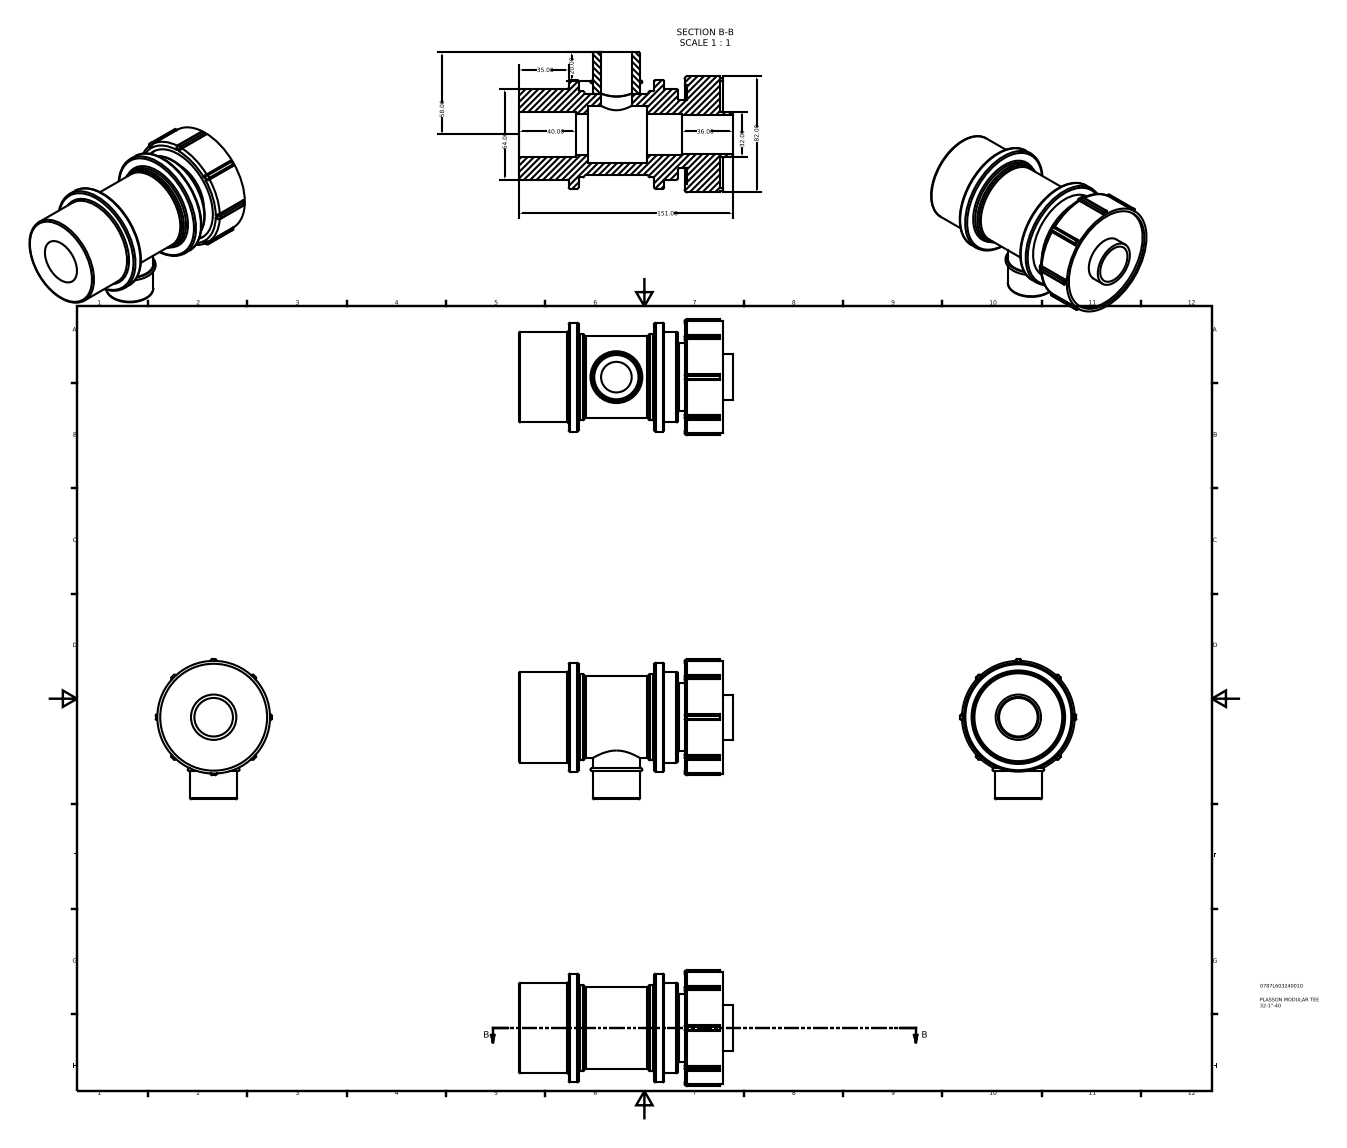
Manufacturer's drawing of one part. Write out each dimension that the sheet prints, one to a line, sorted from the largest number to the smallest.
151.00
82.00
64.00
58.00
40.00
36.00
35.00
32.00
20.00
